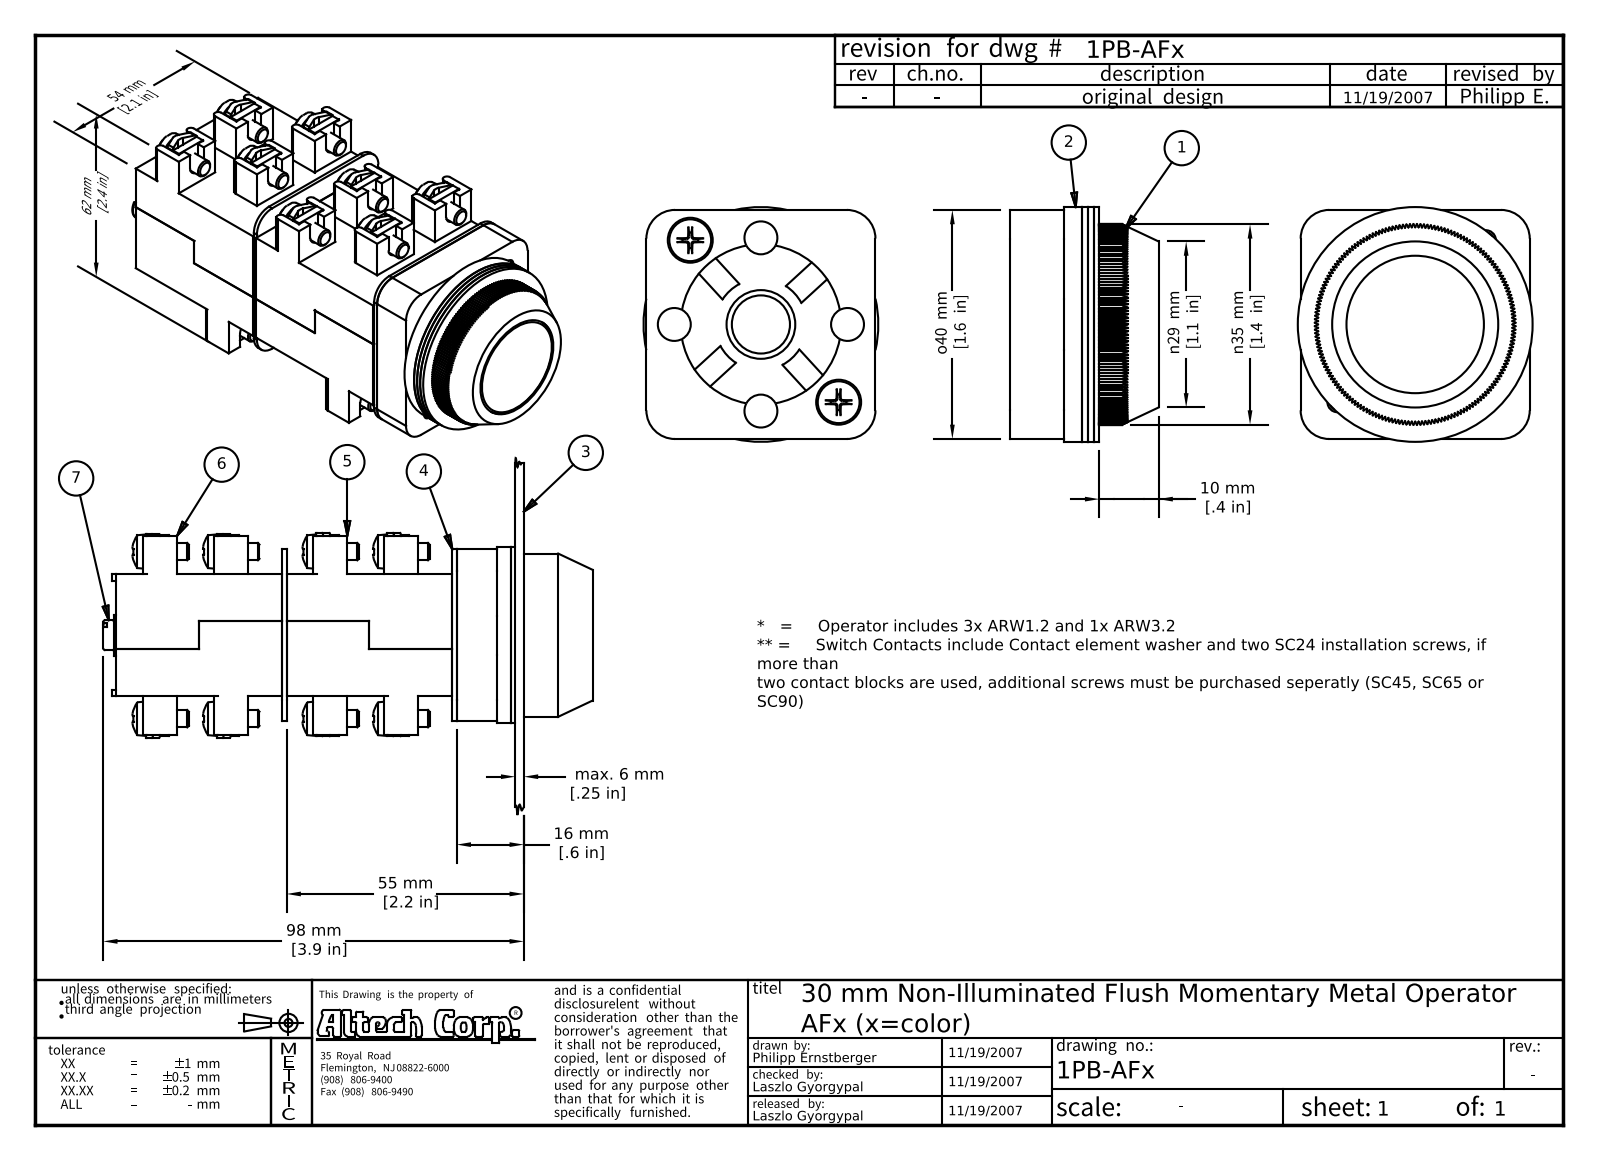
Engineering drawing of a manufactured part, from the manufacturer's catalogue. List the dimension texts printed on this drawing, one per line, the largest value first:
98 mm [3.9 in]
62 mm [2.4 in]
55 mm [2.2 in]
54 mm [2.1 in]
o40 mm [1.6 in]
n35 mm [1.4 in]
n29 mm [1.1 in]
16 mm [.6 in]
10 mm [.4 in]
max. 6 mm [.25 in]
